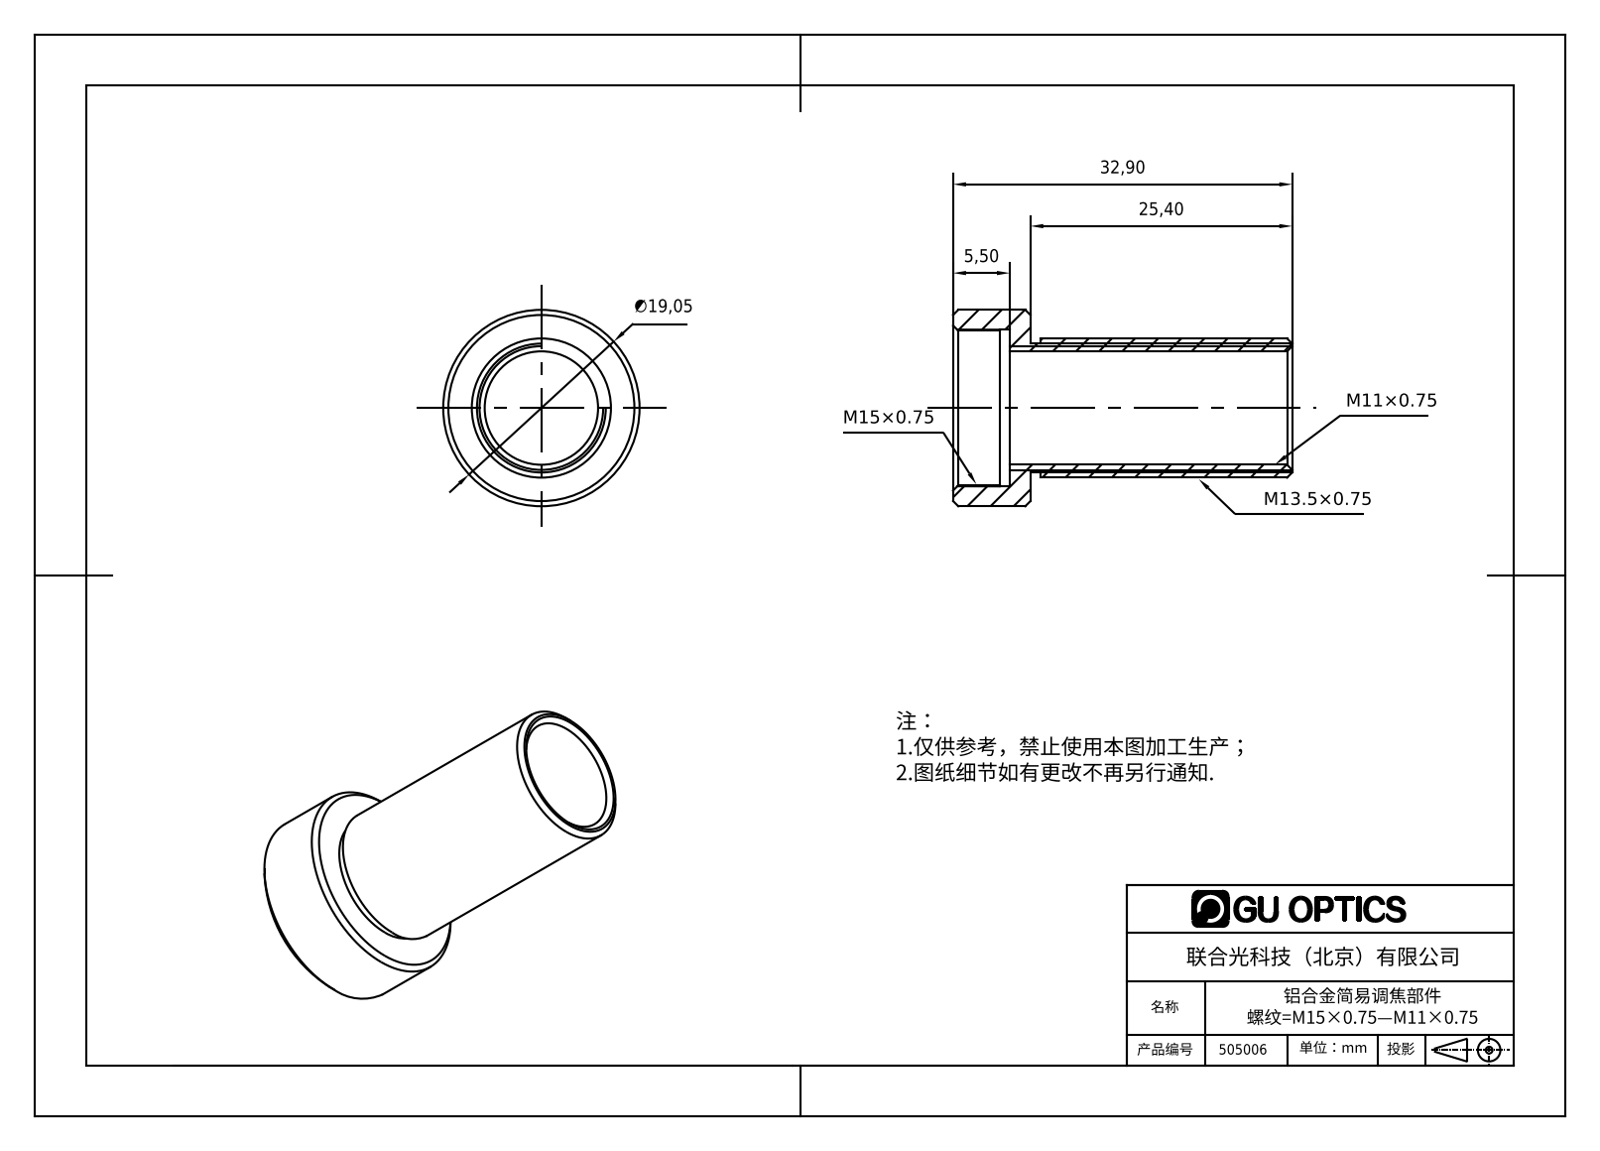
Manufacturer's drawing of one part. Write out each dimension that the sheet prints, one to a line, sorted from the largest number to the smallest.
32,90
25,40
∅19,05
5,50
